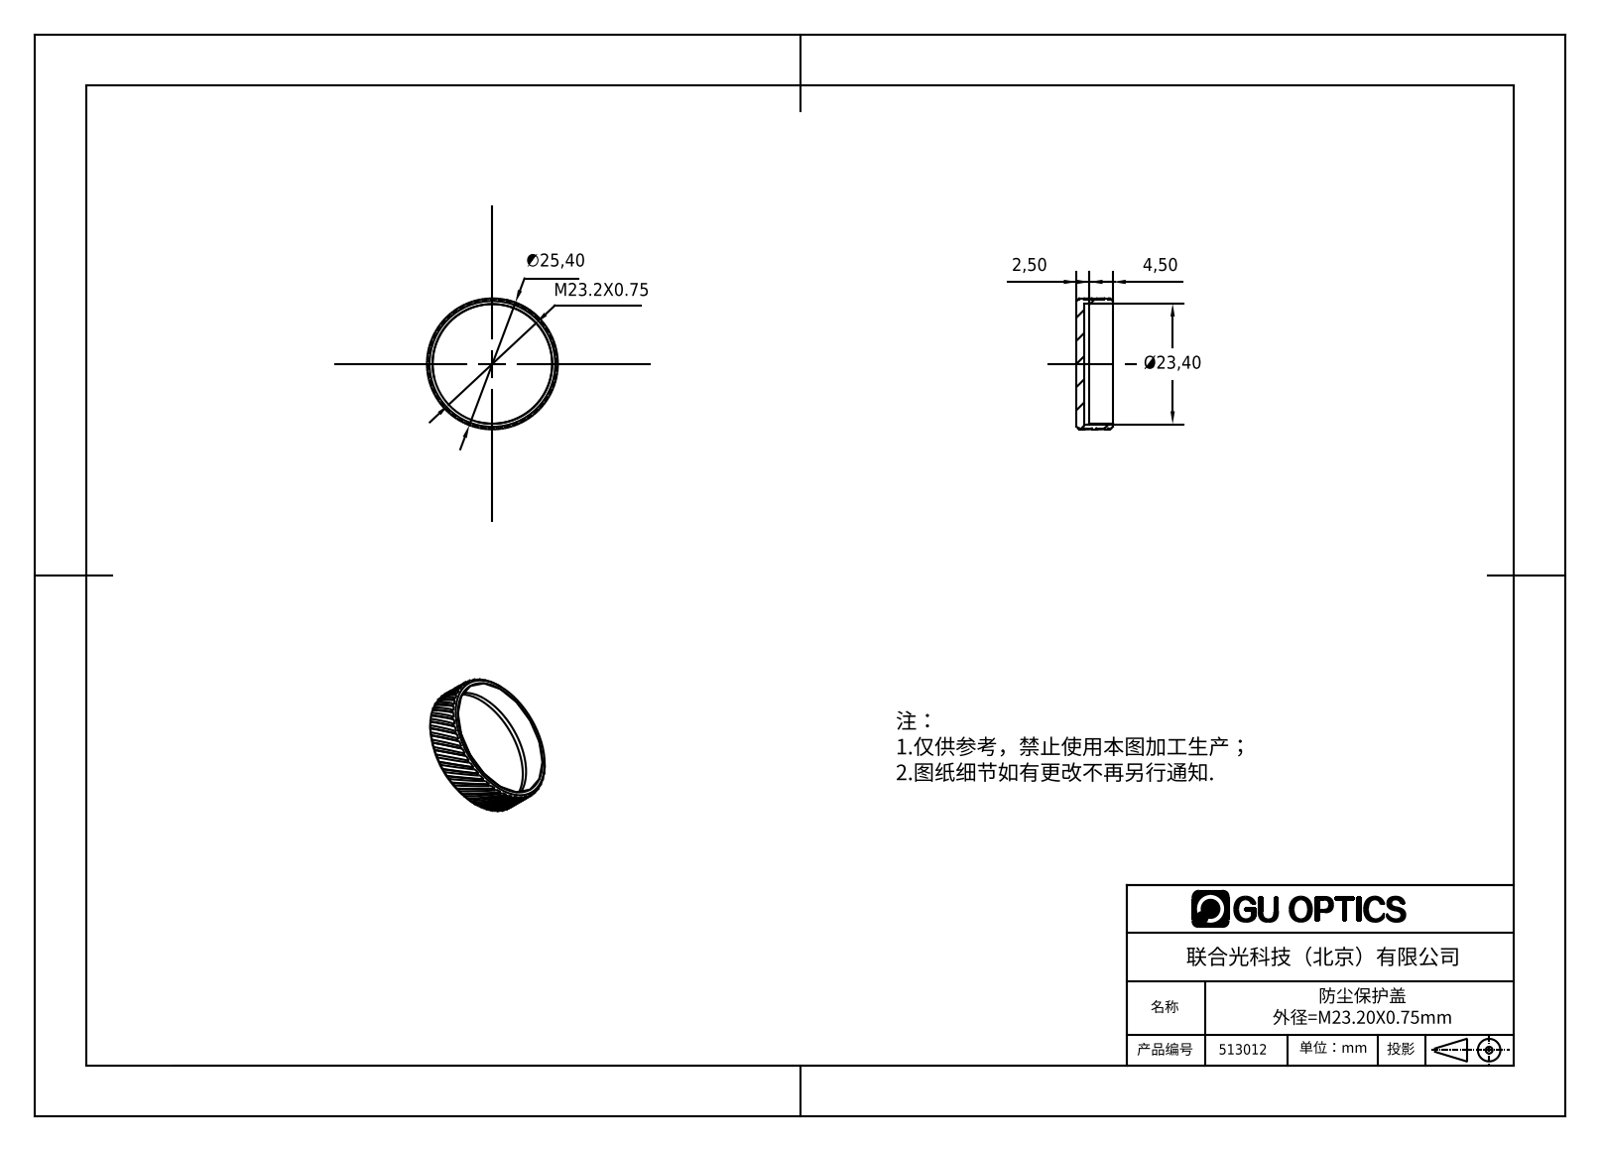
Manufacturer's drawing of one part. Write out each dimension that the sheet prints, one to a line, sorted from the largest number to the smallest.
∅25,40
Ø23,40
M23.2X0.75
4,50
2,50
